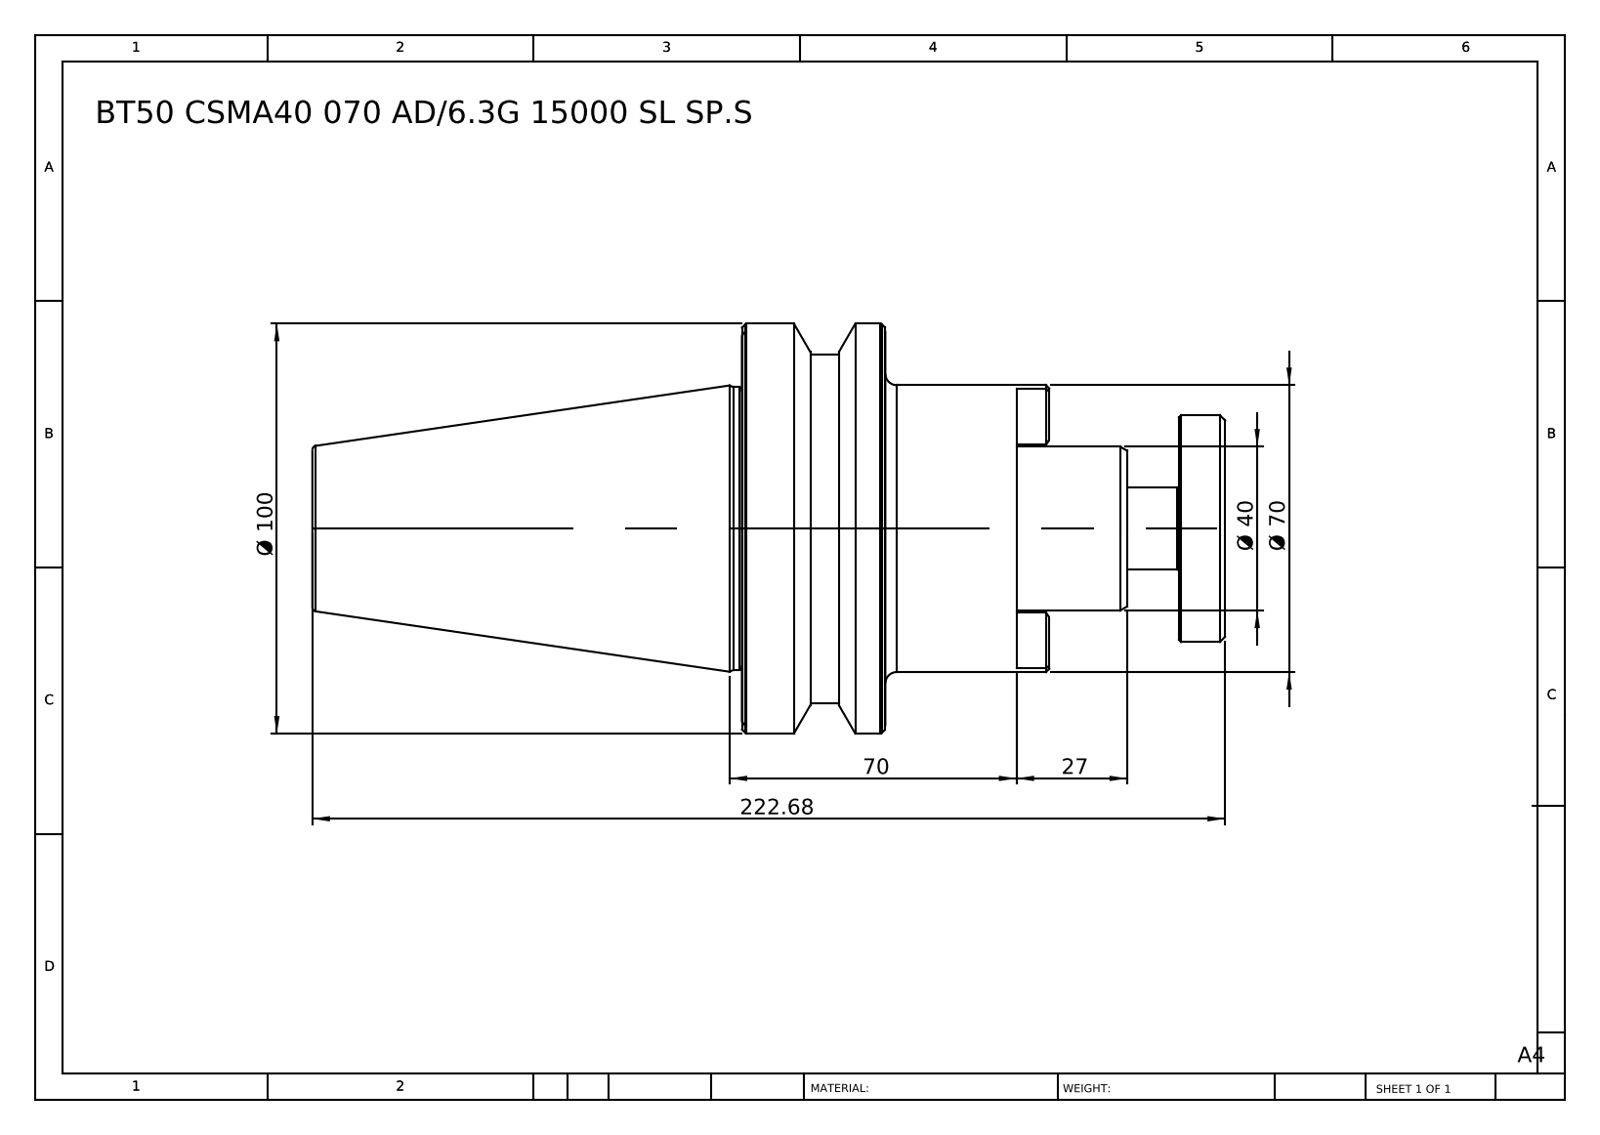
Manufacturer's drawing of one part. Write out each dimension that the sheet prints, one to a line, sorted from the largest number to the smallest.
222.68
Ø 100
Ø 70
70
Ø 40
27
